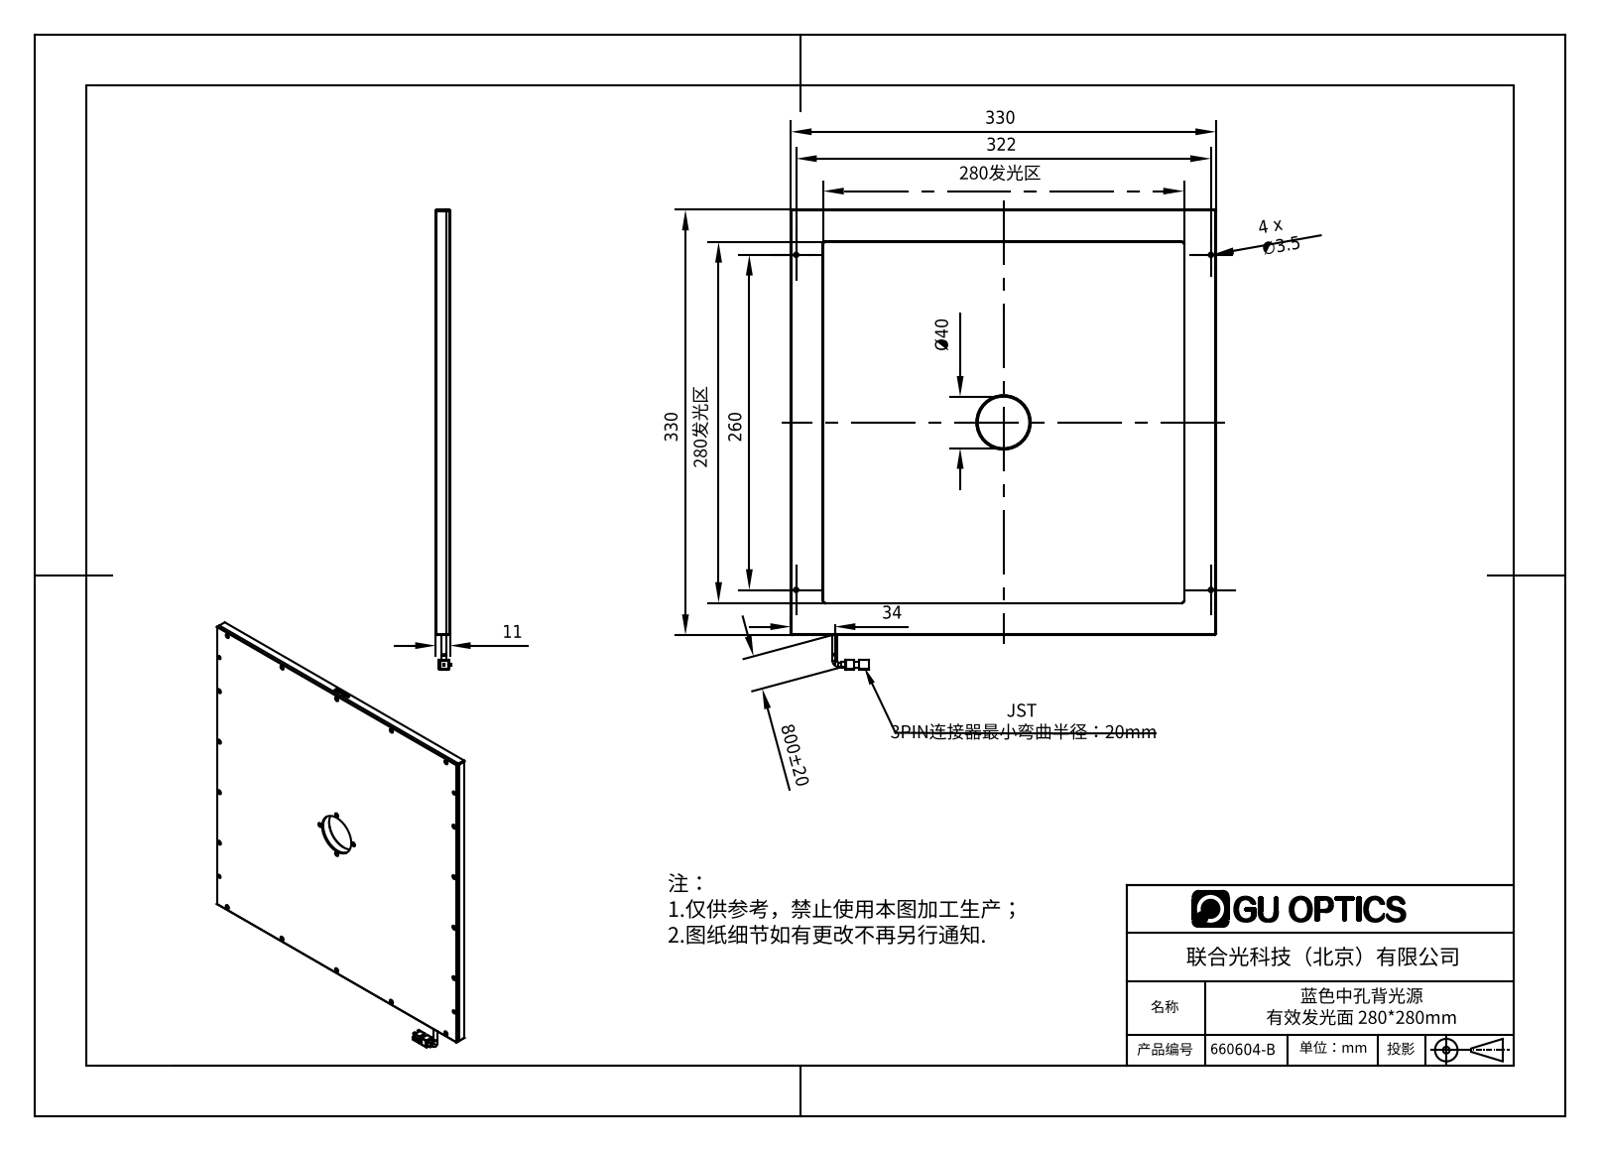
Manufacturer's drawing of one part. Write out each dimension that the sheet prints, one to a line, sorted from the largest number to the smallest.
800±20
330
330
322
280发光区
280发光区
260
Ø40
34
11
4 x ∅3.5
